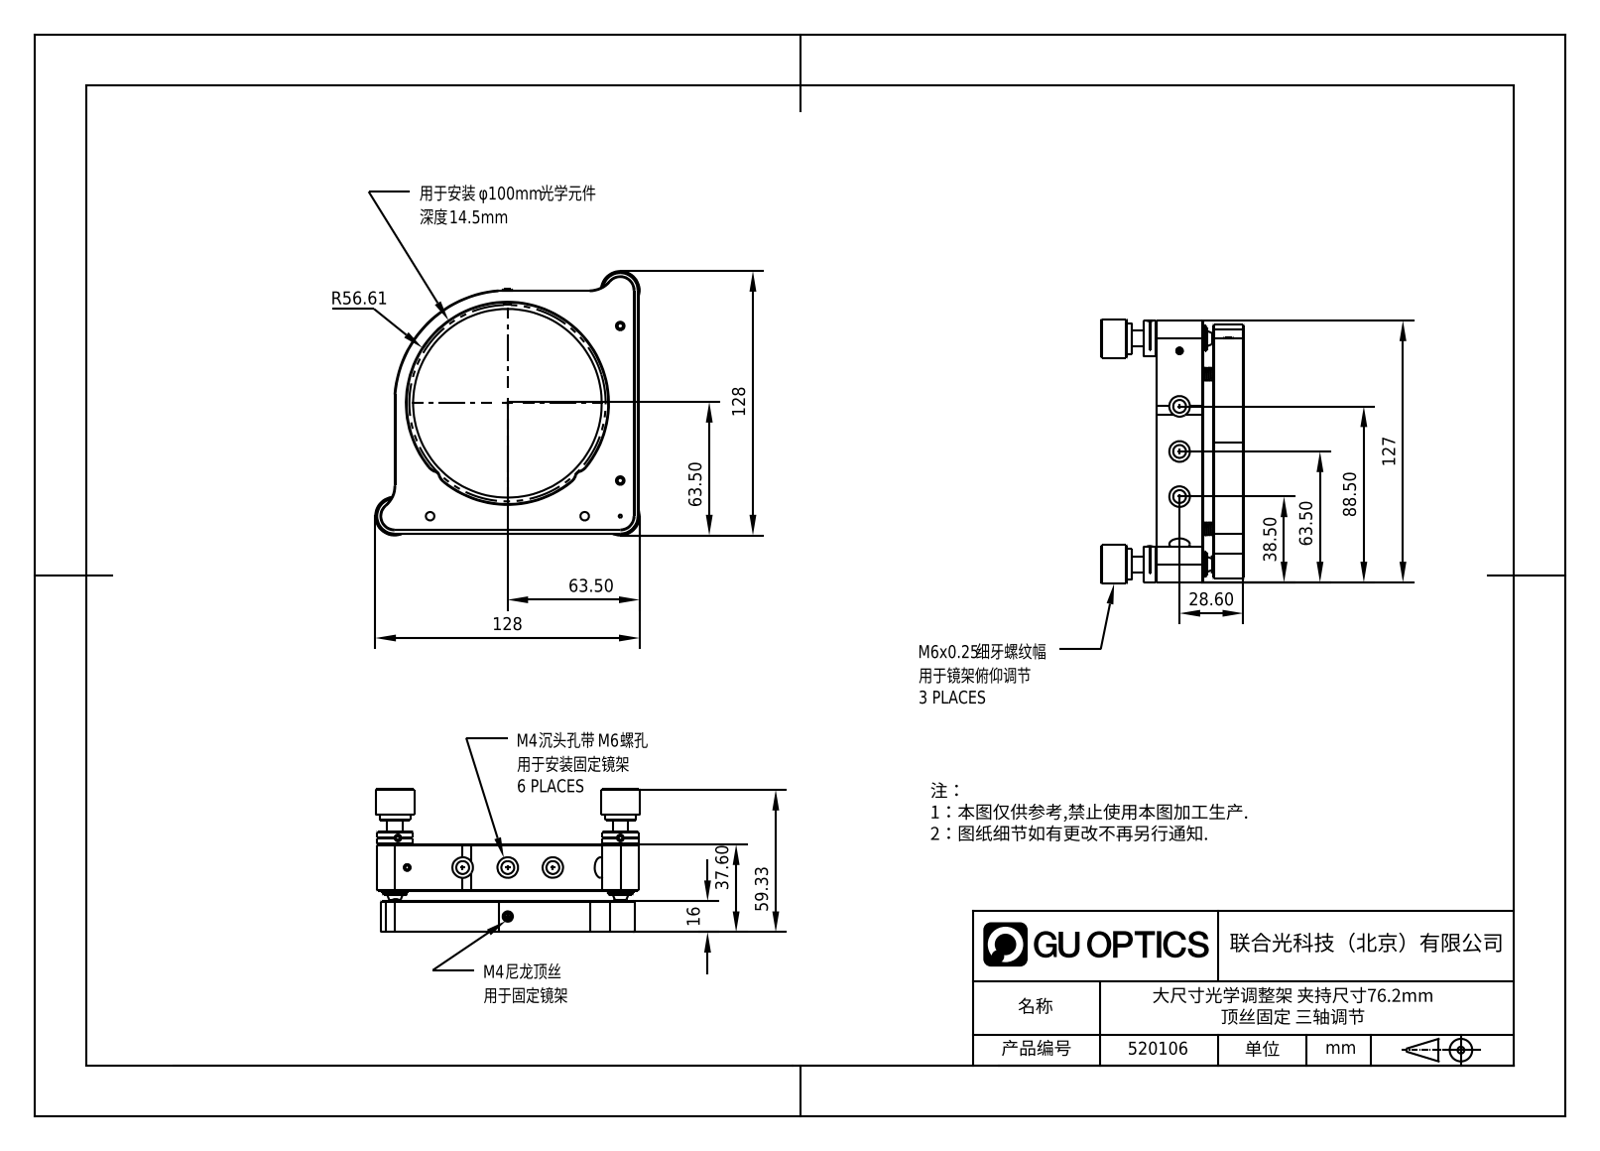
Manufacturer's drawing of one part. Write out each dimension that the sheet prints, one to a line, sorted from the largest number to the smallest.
128
128
127
88.50
63.50
63.50
63.50
59.33
38.50
37.60
28.60
16
